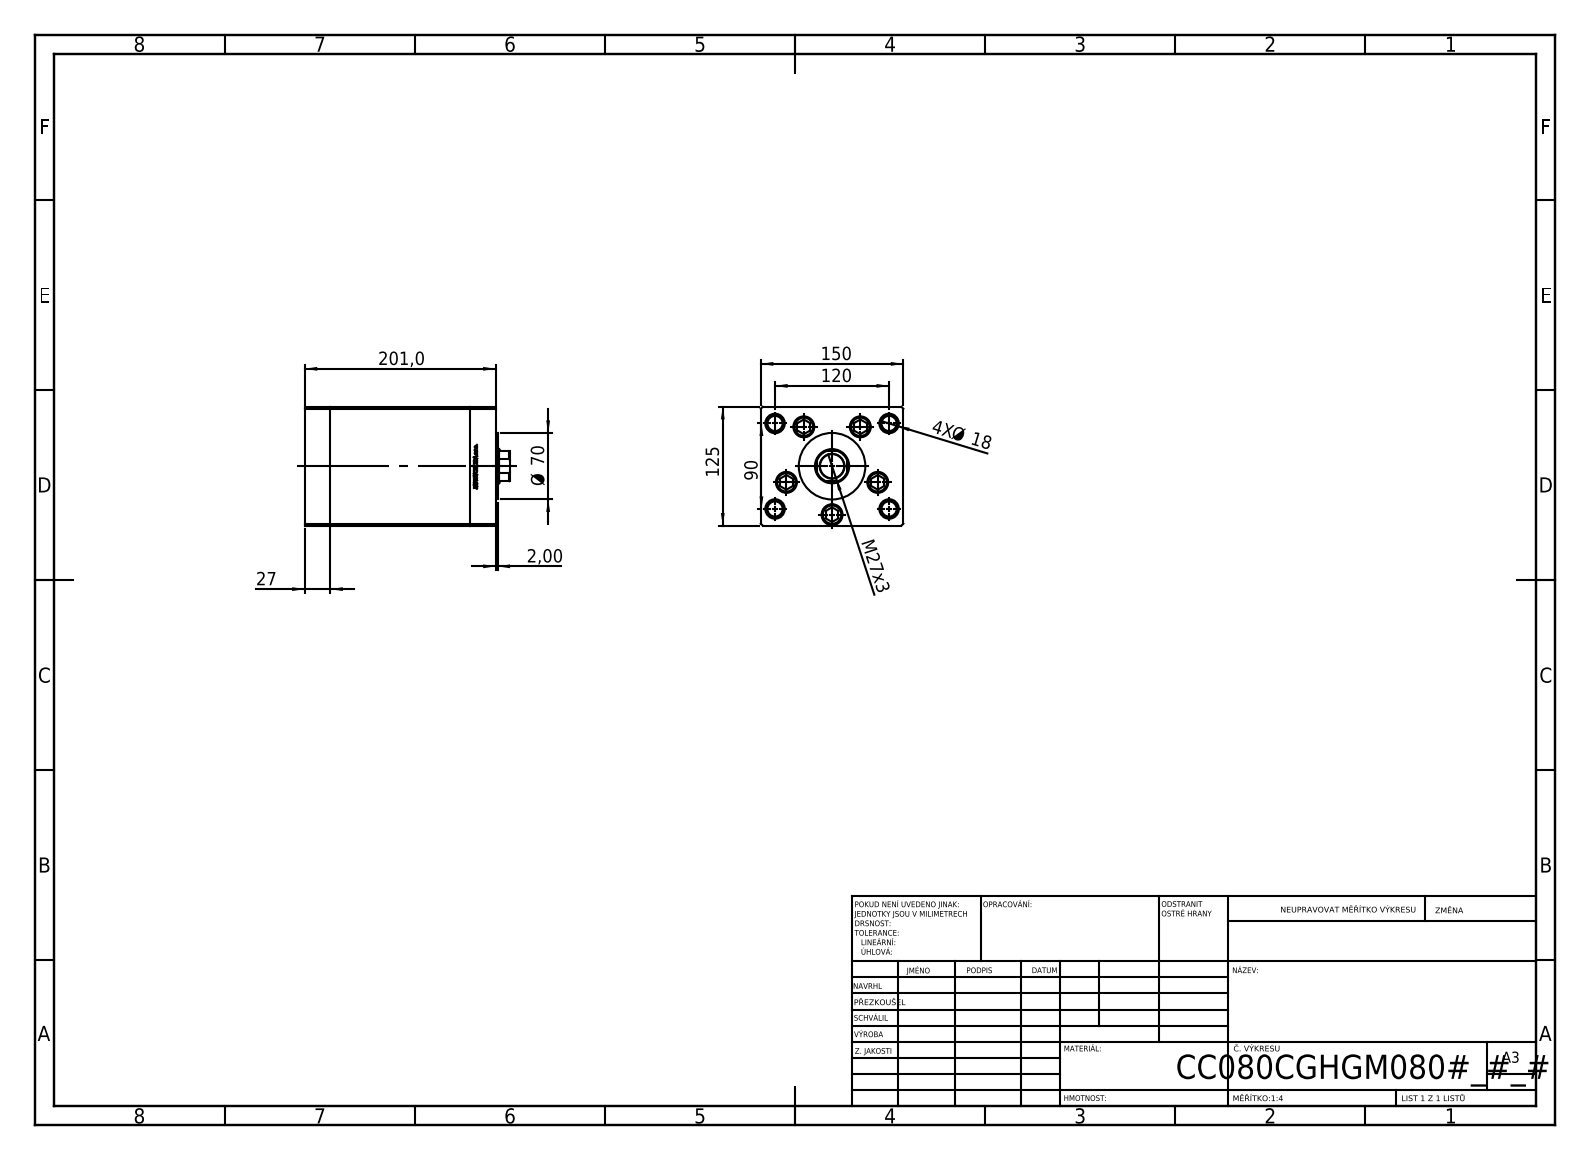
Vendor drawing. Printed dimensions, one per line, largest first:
201,0
150
125
120
90
Ø 70
27
M27x3
4X Ø 18
2,00
